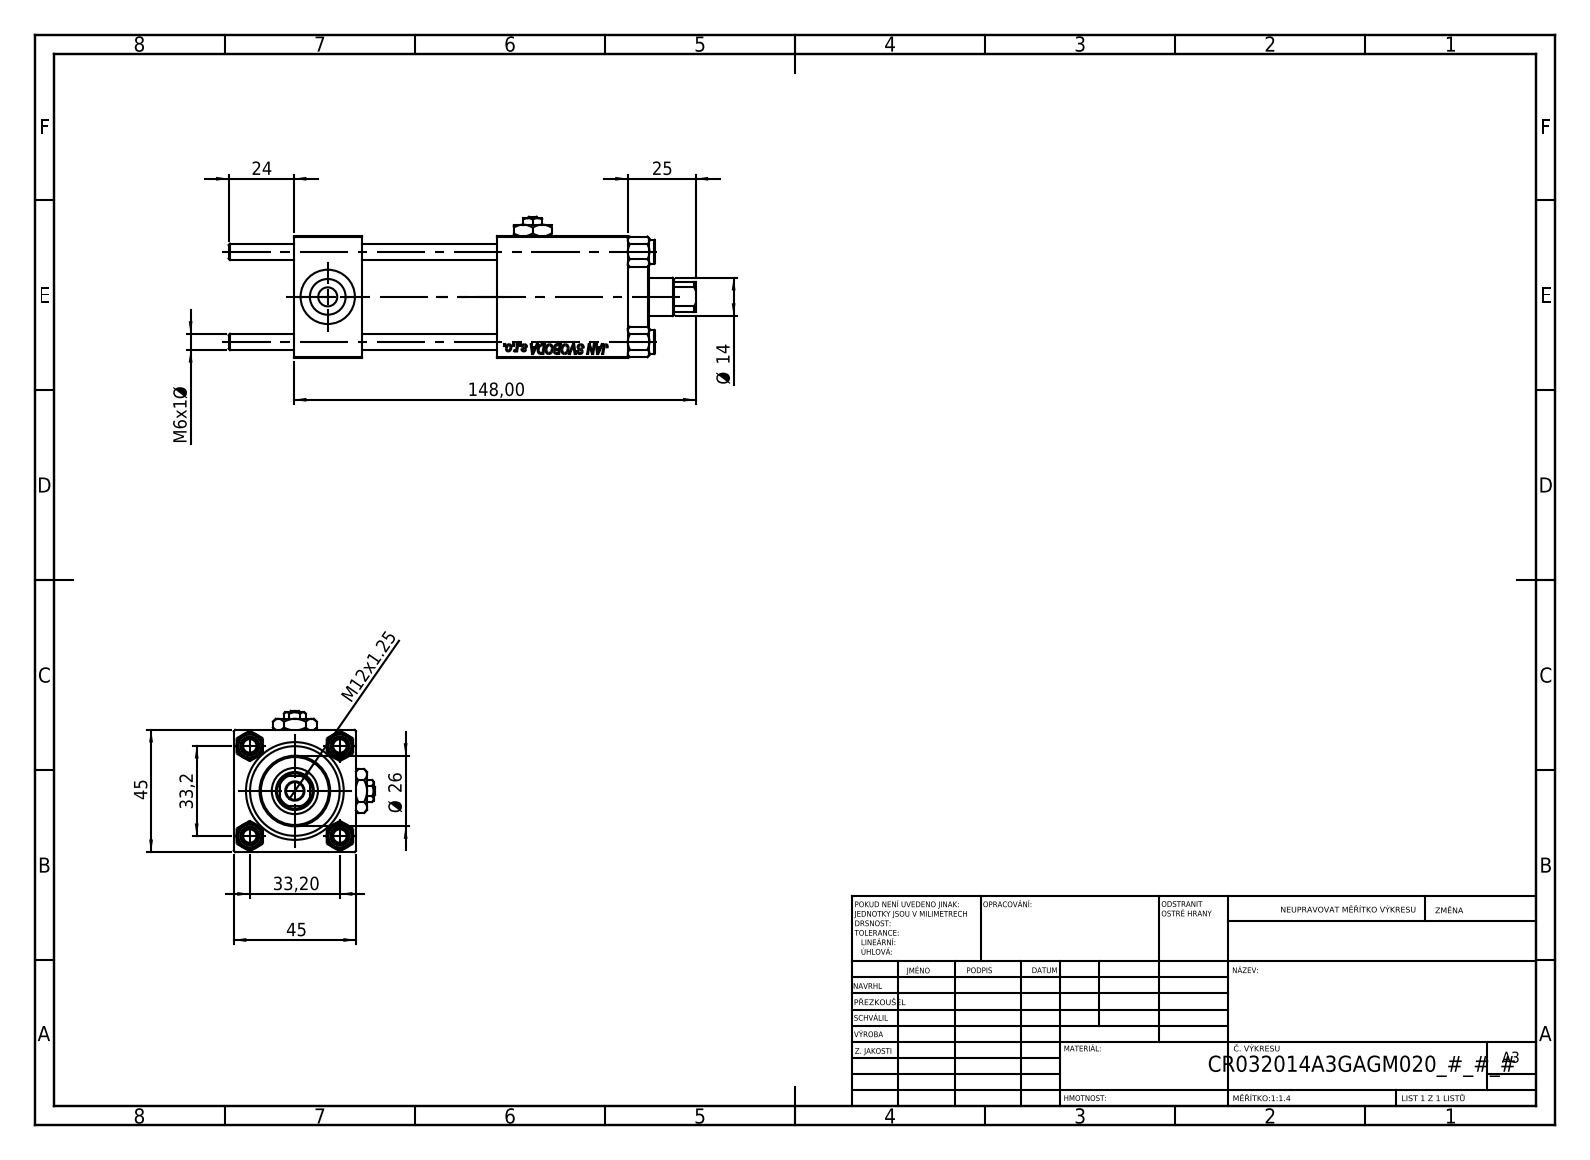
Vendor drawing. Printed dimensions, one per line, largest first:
148,00
45
45
33,2
33,20
Ø 26
25
24
Ø 14
M12x1.25
M6x1 Ø
